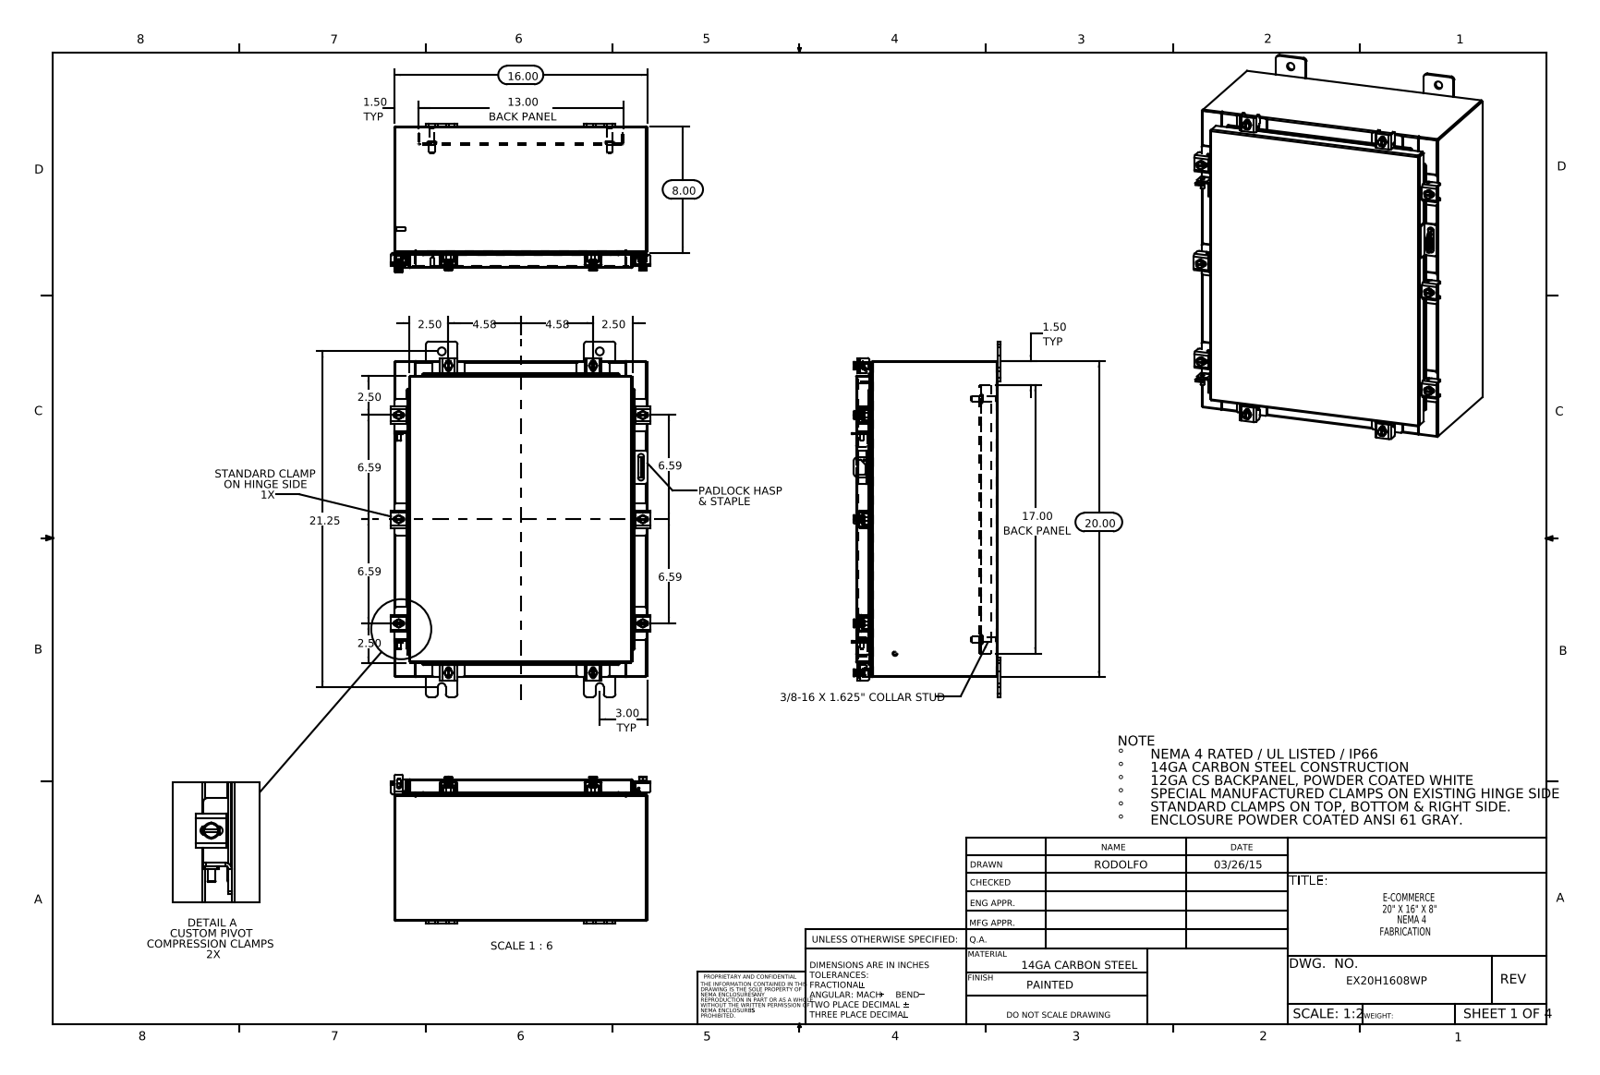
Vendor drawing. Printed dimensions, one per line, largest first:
21.25
20.00
17.00 BACK PANEL
16.00
13.00 BACK PANEL
8.00
6.59
6.59
6.59
6.59
4.58
4.58
3.00 TYP
2.50
2.50
2.50
2.50
1.50 TYP
1.50 TYP
